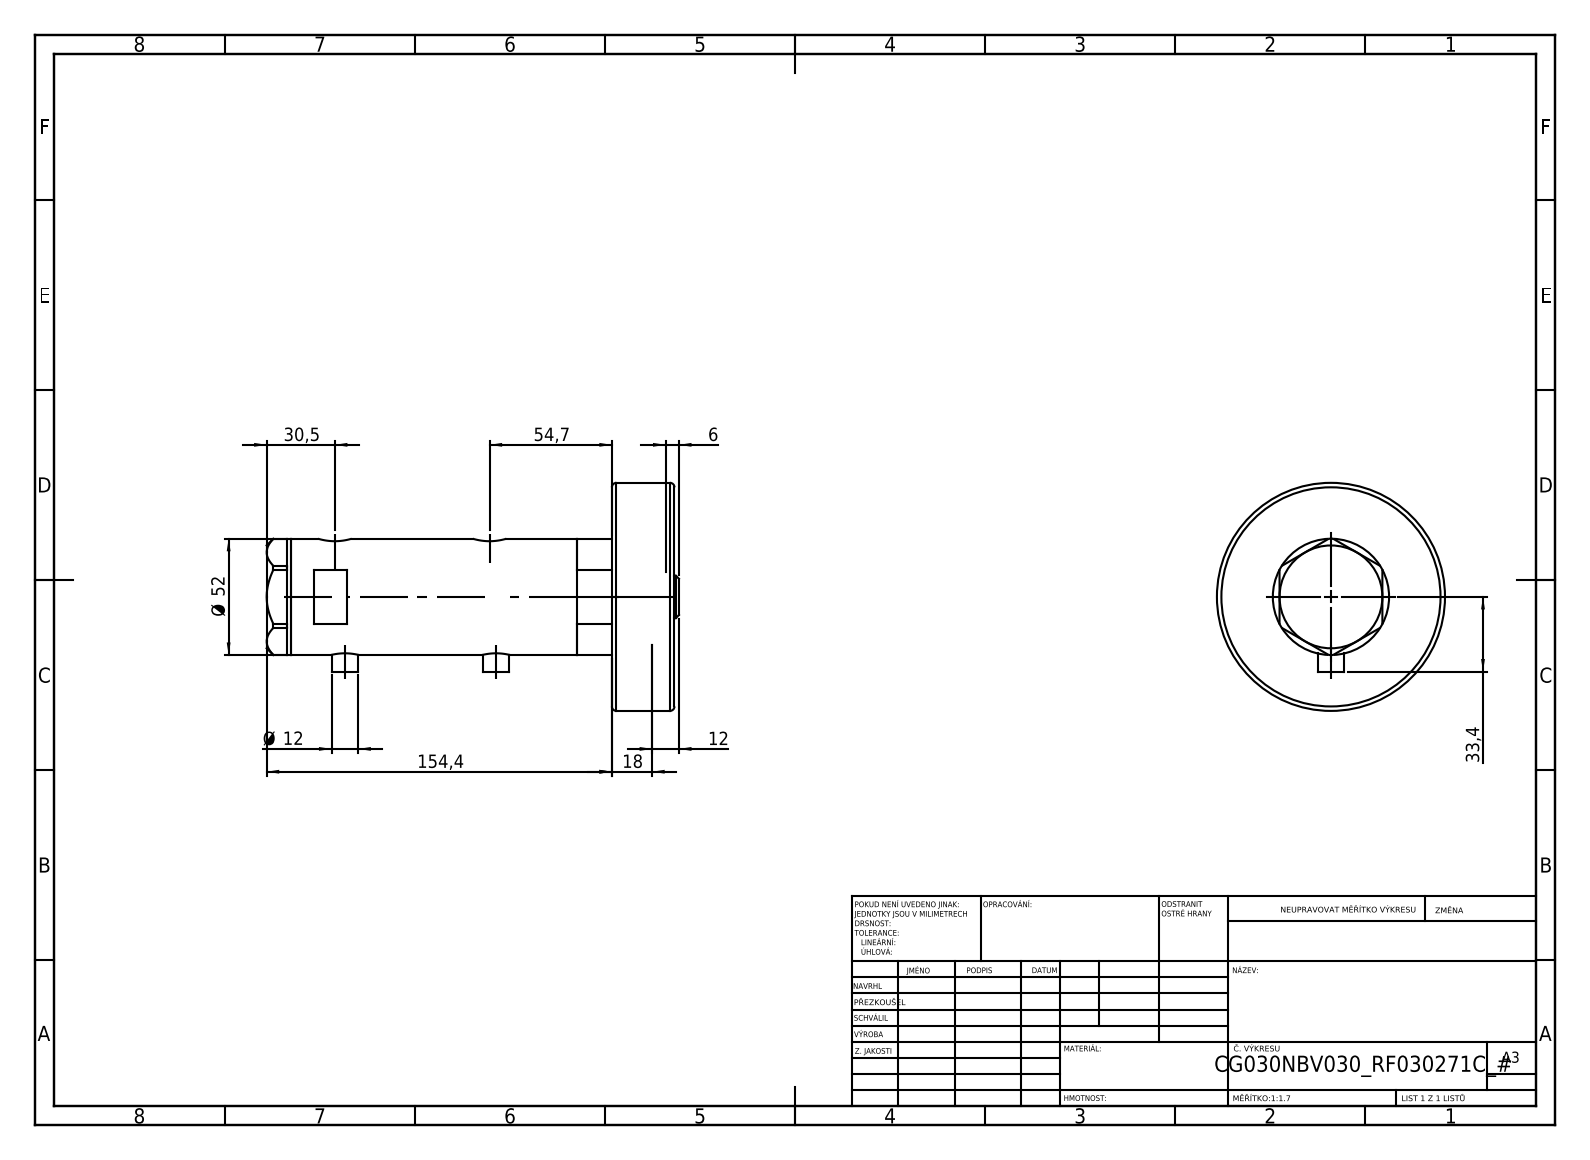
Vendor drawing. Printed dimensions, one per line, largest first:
154,4
54,7
Ø 52
33,4
30,5
18
12
Ø 12
6
